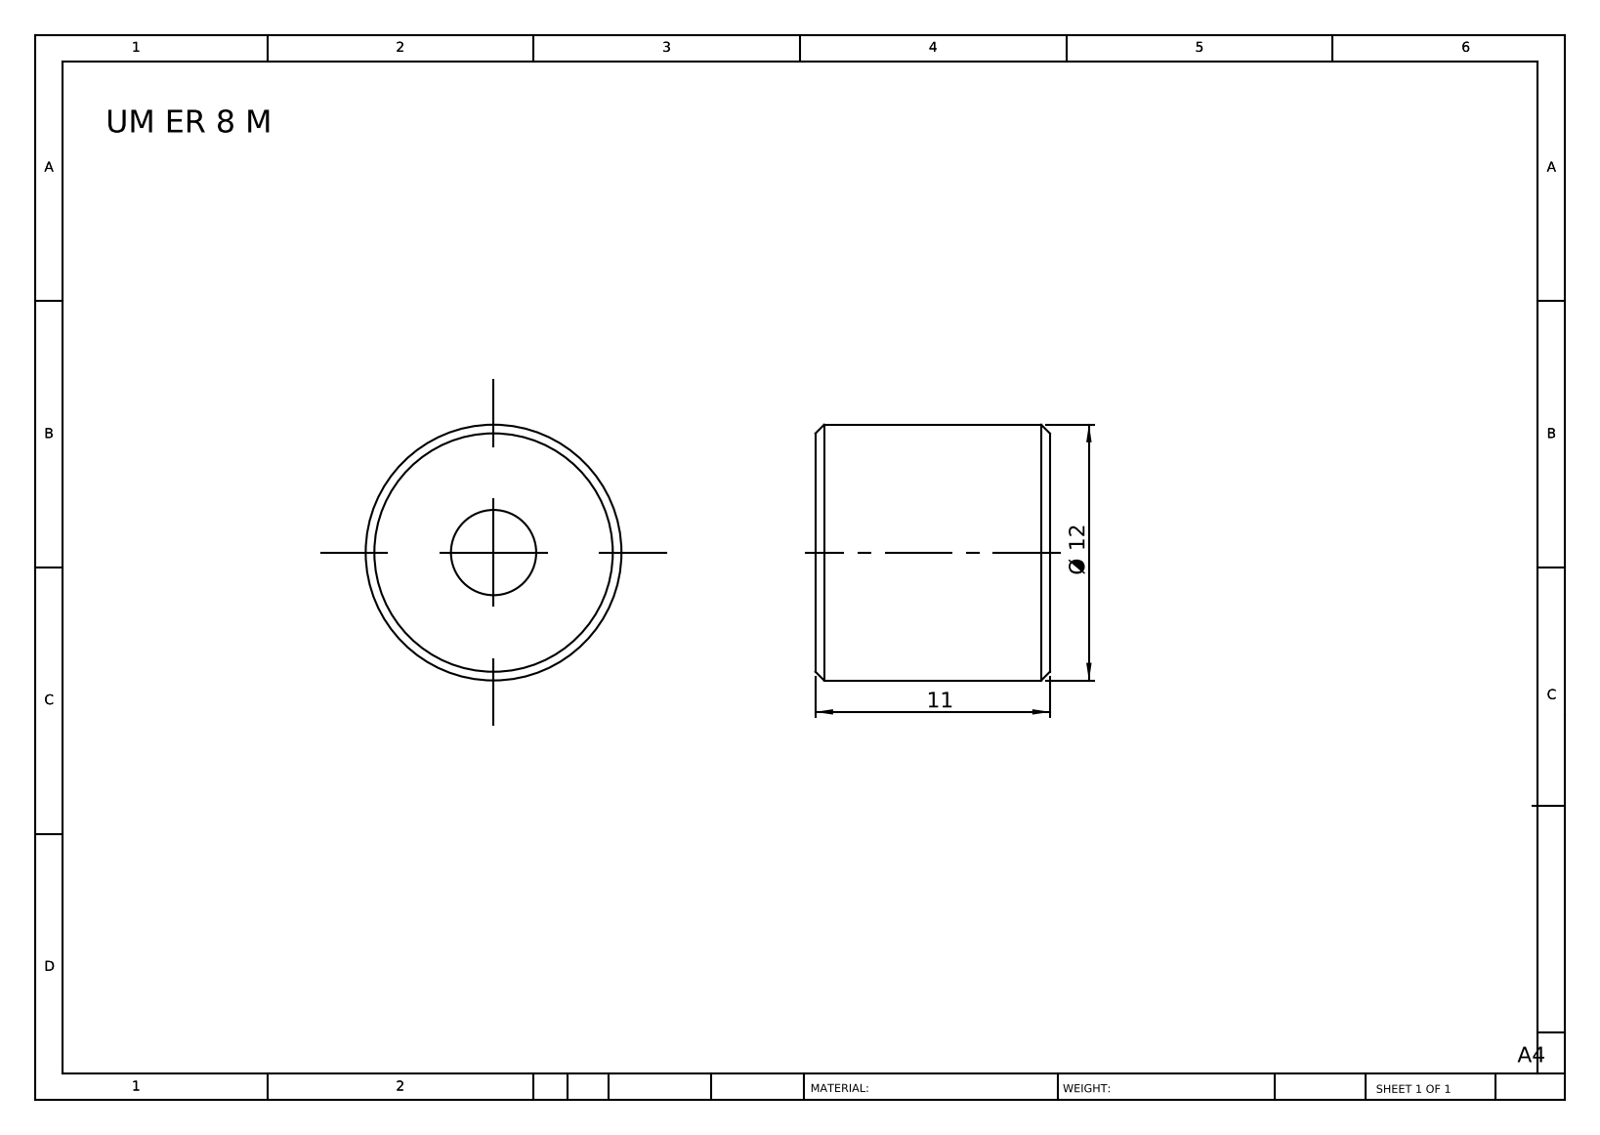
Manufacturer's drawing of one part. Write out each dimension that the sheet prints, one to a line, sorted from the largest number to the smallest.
Ø 12
11
